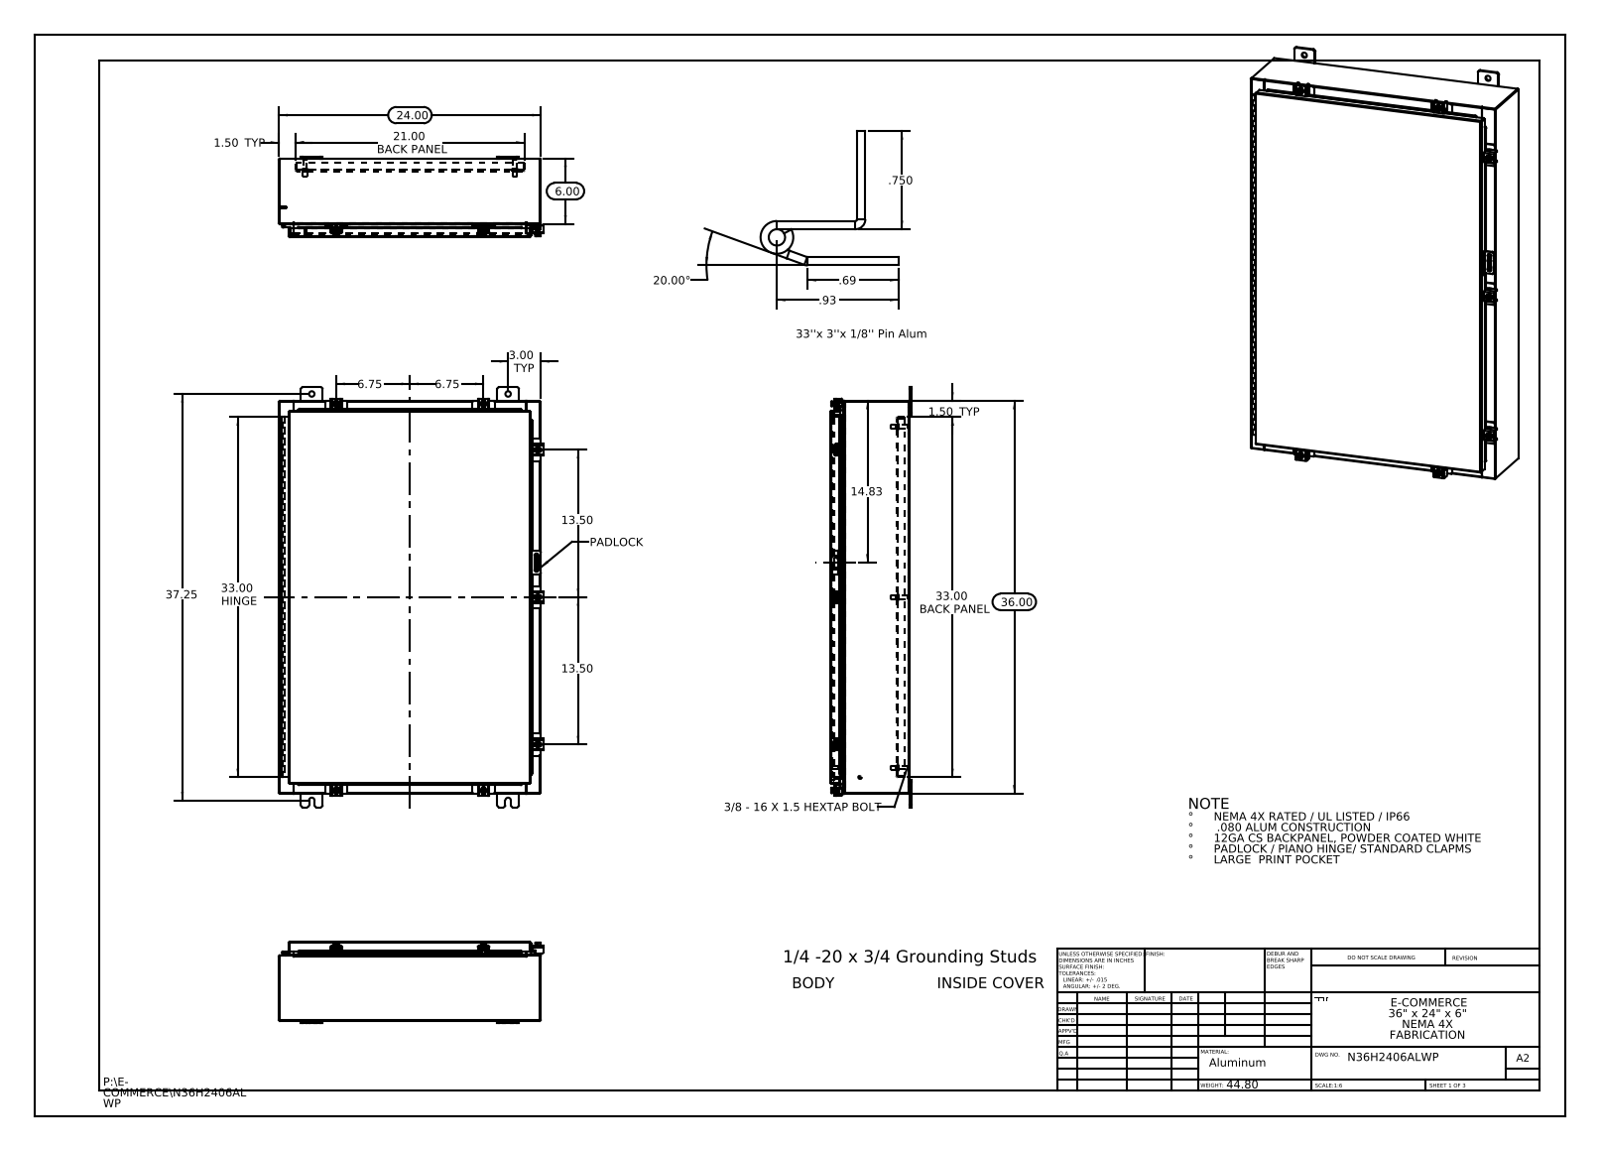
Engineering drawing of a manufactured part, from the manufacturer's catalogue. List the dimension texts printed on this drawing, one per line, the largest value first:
37.25
36.00
33.00 HINGE
33.00 BACK PANEL
24.00
21.00 BACK PANEL
20.00°
14.83
13.50
13.50
6.75
6.75
6.00
3.00 TYP
1.50 TYP
1.50 TYP
.93
.750
.69
